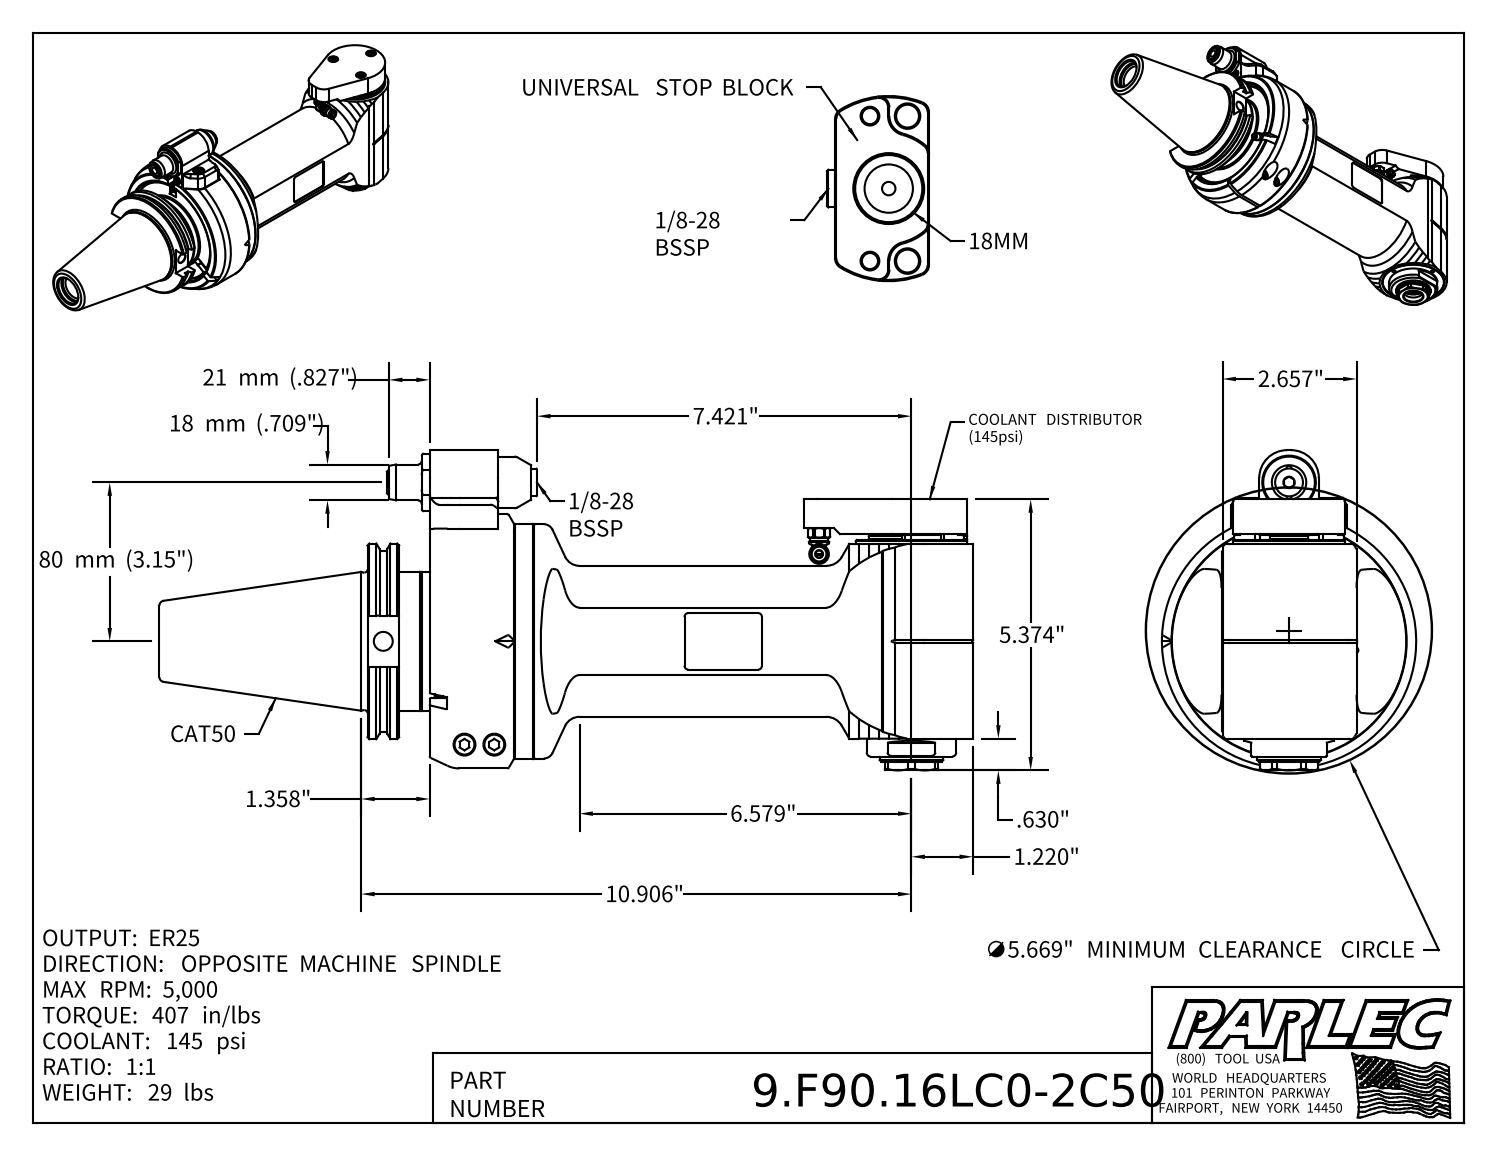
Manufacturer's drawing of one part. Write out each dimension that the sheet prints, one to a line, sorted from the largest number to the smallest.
80 mm (3.15")
21 mm (.827")
18 mm (.709")
10.906"
7.421"
6.579"
∅5.669" MINIMUM CLEARANCE CIRCLE
5.374"
2.657"
1.358"
1.220"
.630"
